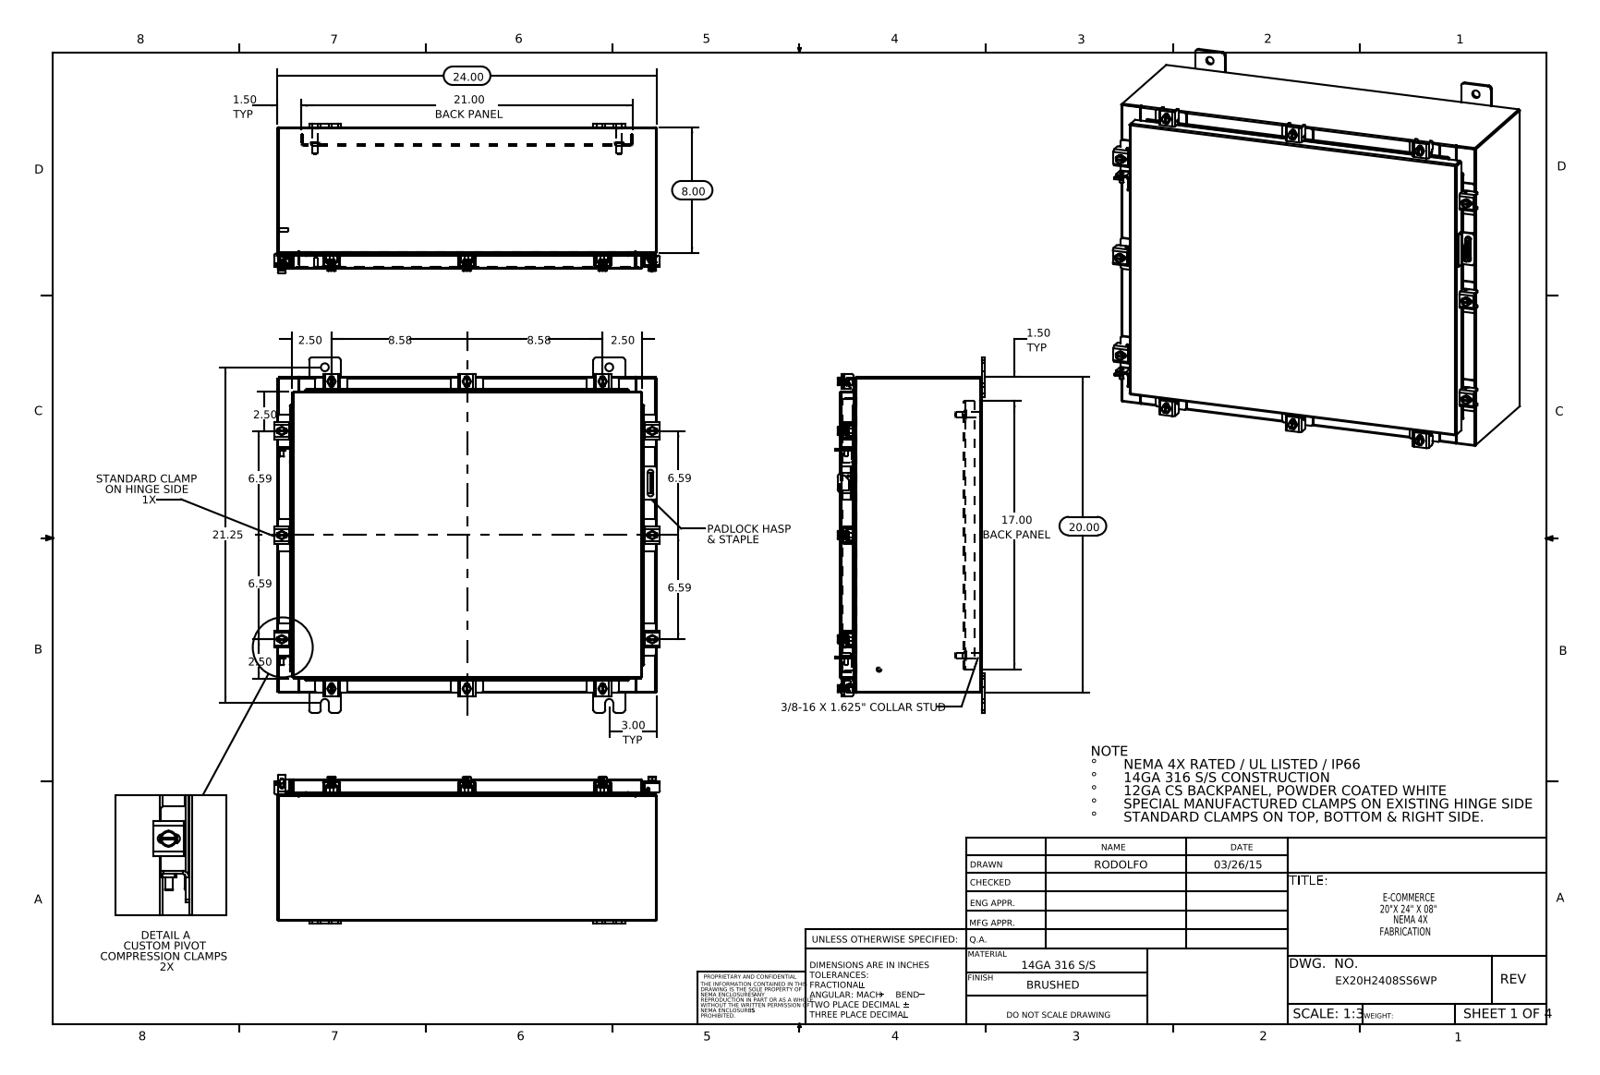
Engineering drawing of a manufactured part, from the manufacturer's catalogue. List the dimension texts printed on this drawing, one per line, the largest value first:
24.00
21.25
21.00 BACK PANEL
20.00
17.00 BACK PANEL
8.58
8.58
8.00
6.59
6.59
6.59
6.59
3.00 TYP
2.50
2.50
2.50
2.50
1.50 TYP
1.50 TYP
